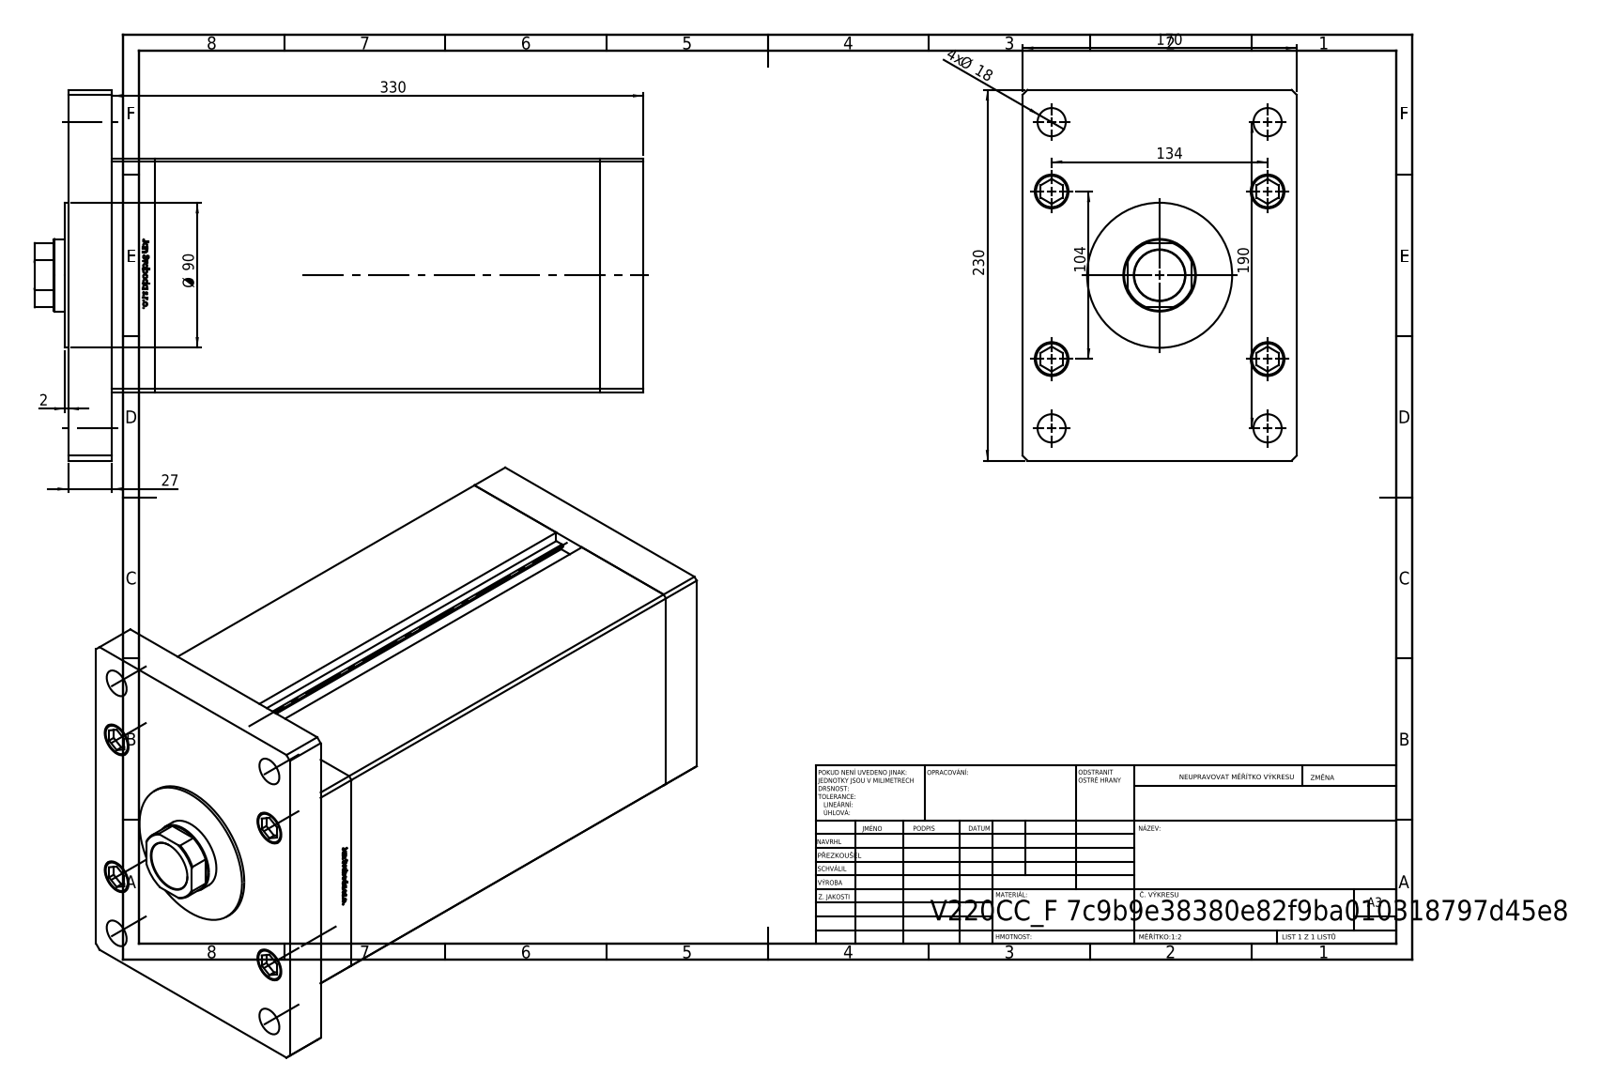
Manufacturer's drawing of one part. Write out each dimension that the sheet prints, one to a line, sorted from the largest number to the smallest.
330
230
190
170
134
104
Ø 90
27
4x Ø 18
2
